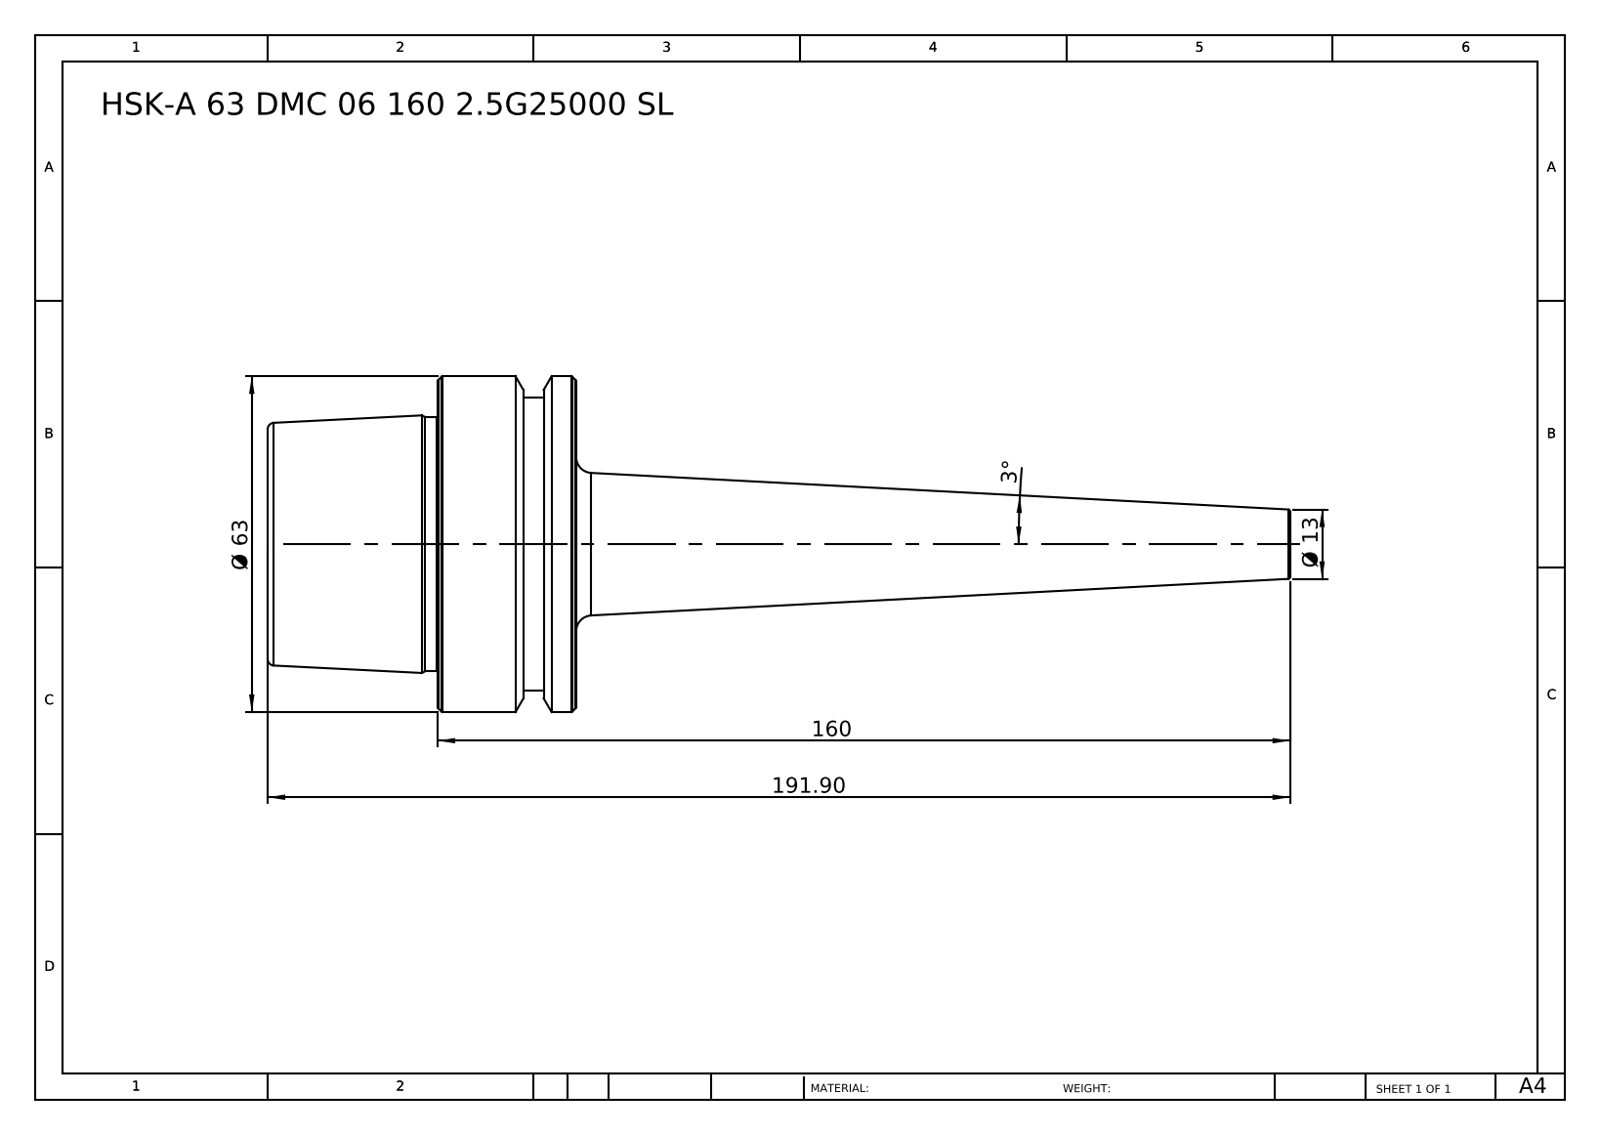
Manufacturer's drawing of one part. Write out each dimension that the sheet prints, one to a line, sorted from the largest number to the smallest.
191.90
160
Ø 63
Ø 13
3°
